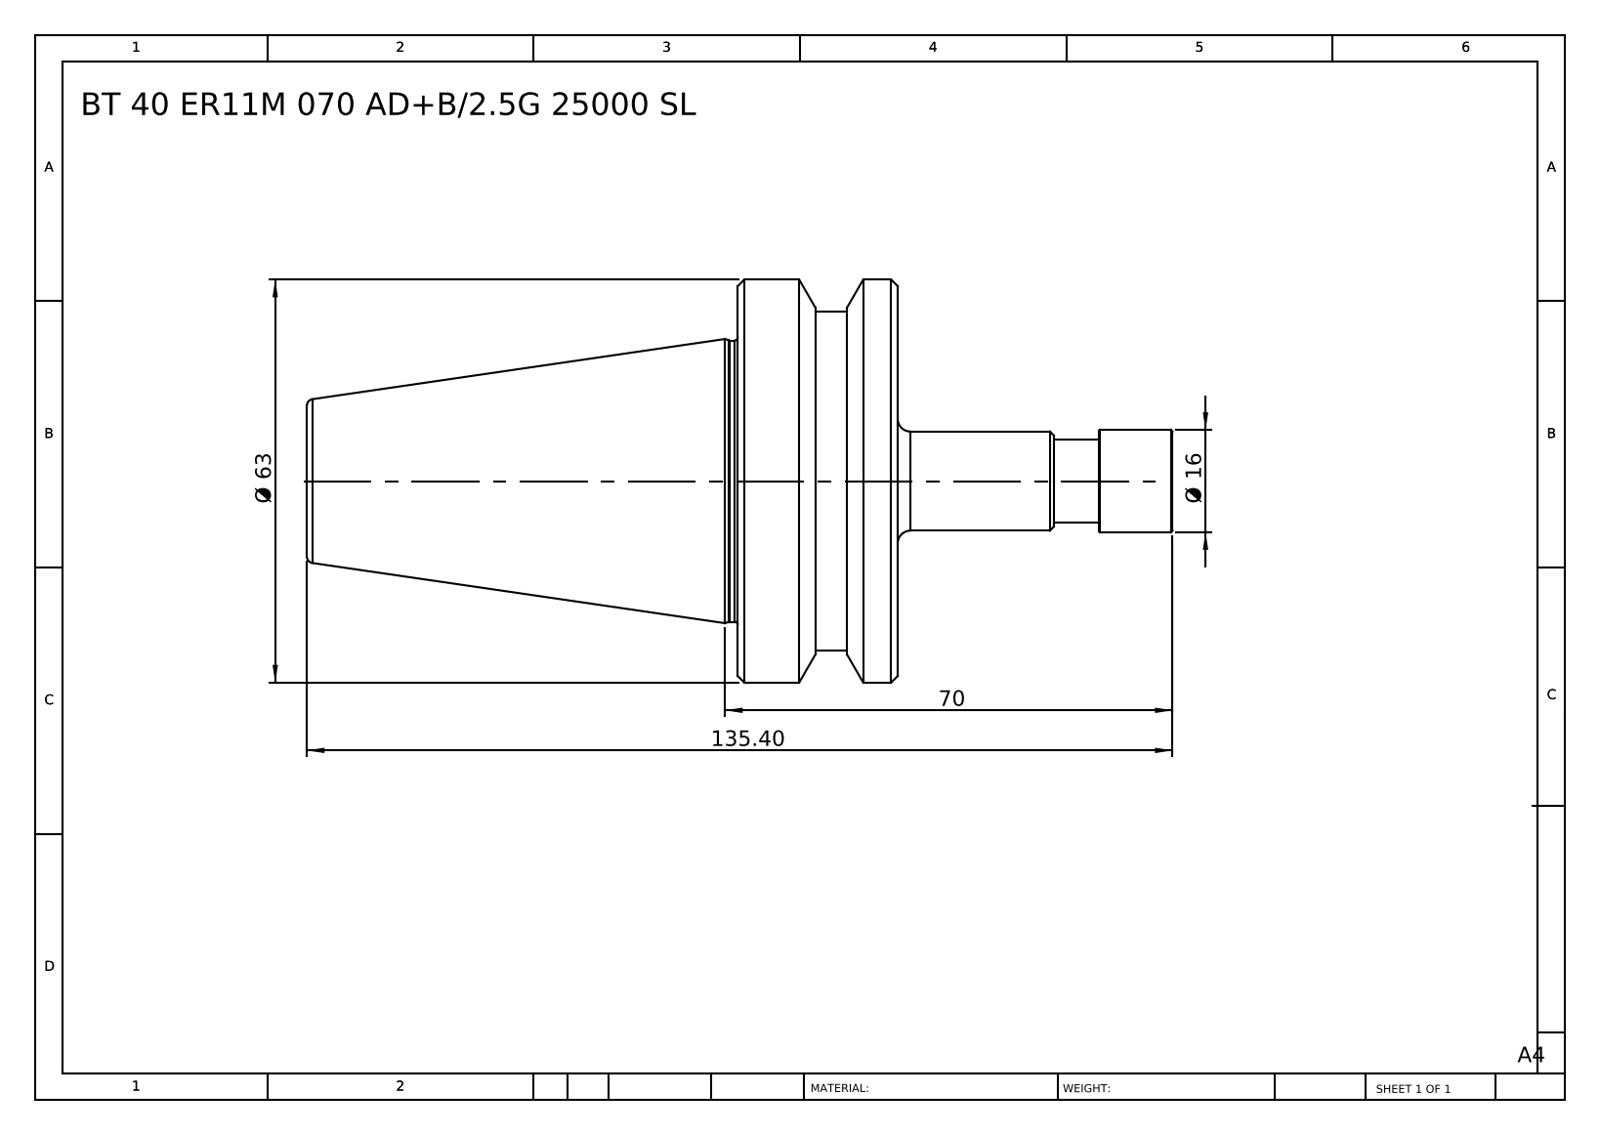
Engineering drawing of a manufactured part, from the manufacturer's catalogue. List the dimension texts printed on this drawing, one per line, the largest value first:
135.40
70
Ø 63
Ø 16
